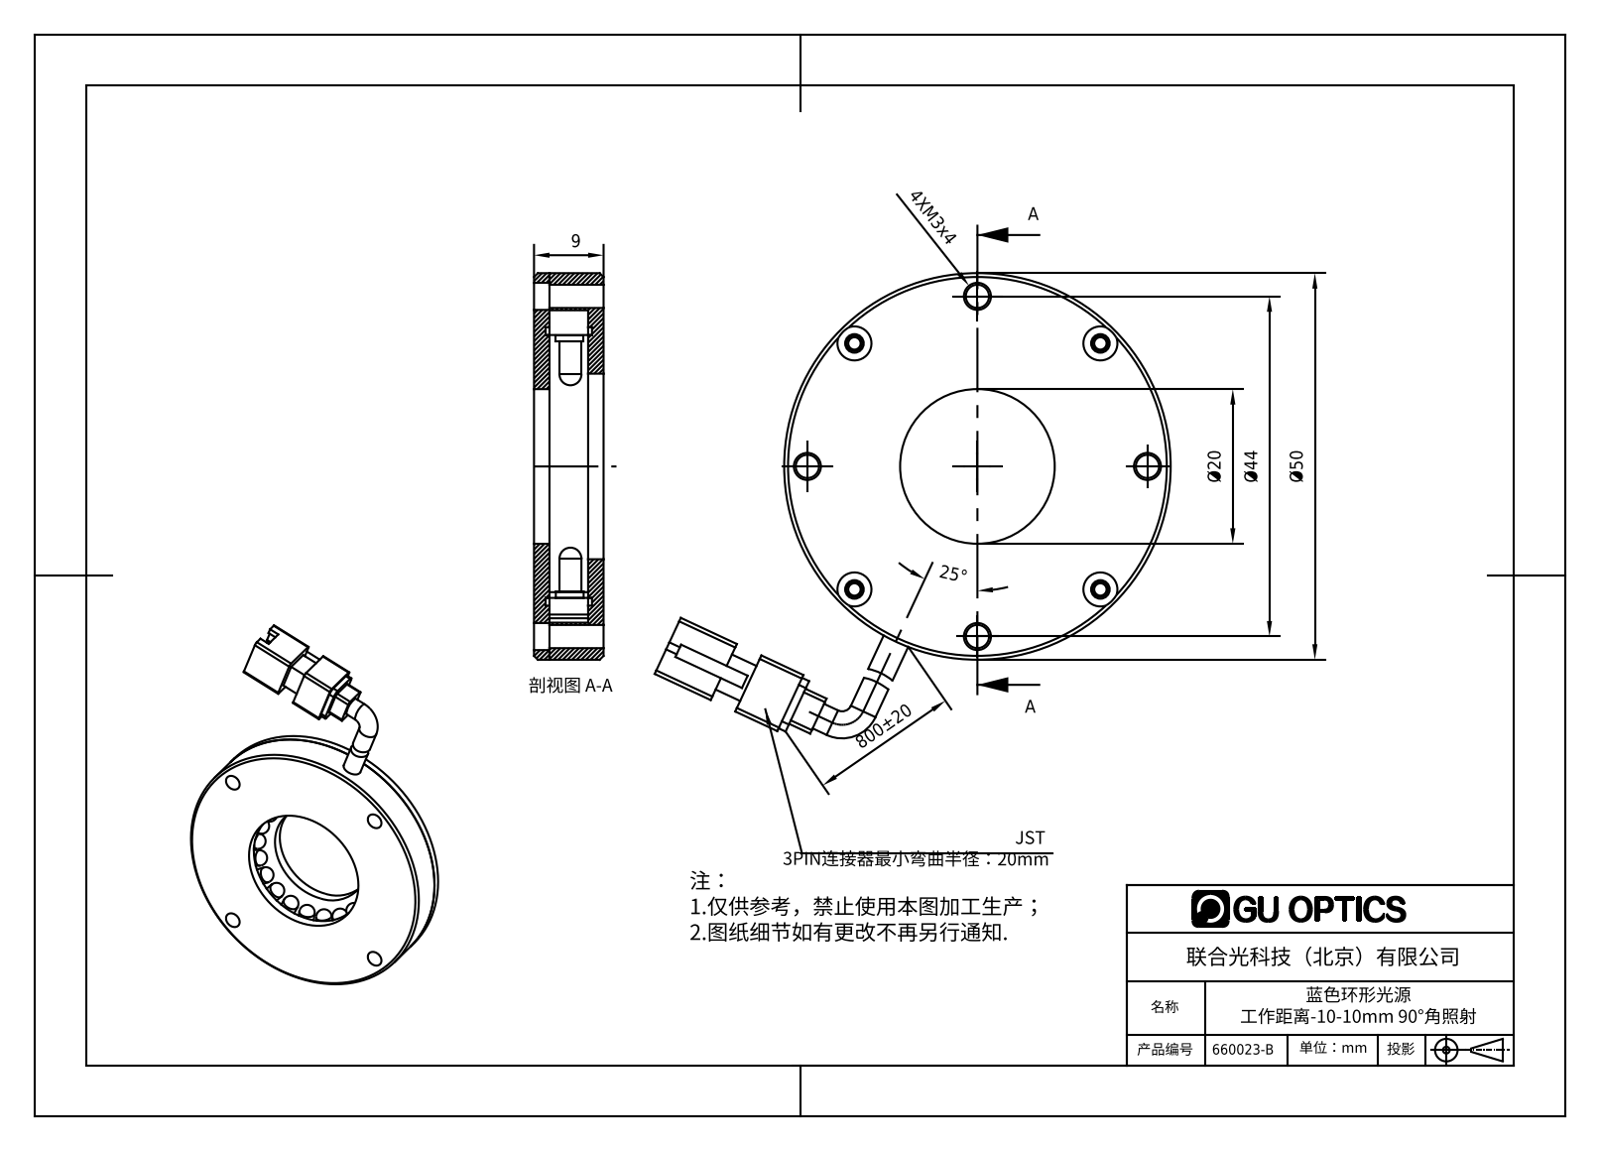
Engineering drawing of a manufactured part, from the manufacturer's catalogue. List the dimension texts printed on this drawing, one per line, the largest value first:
800±20
Ø50
Ø44
25°
Ø20
9
4XM3x4
